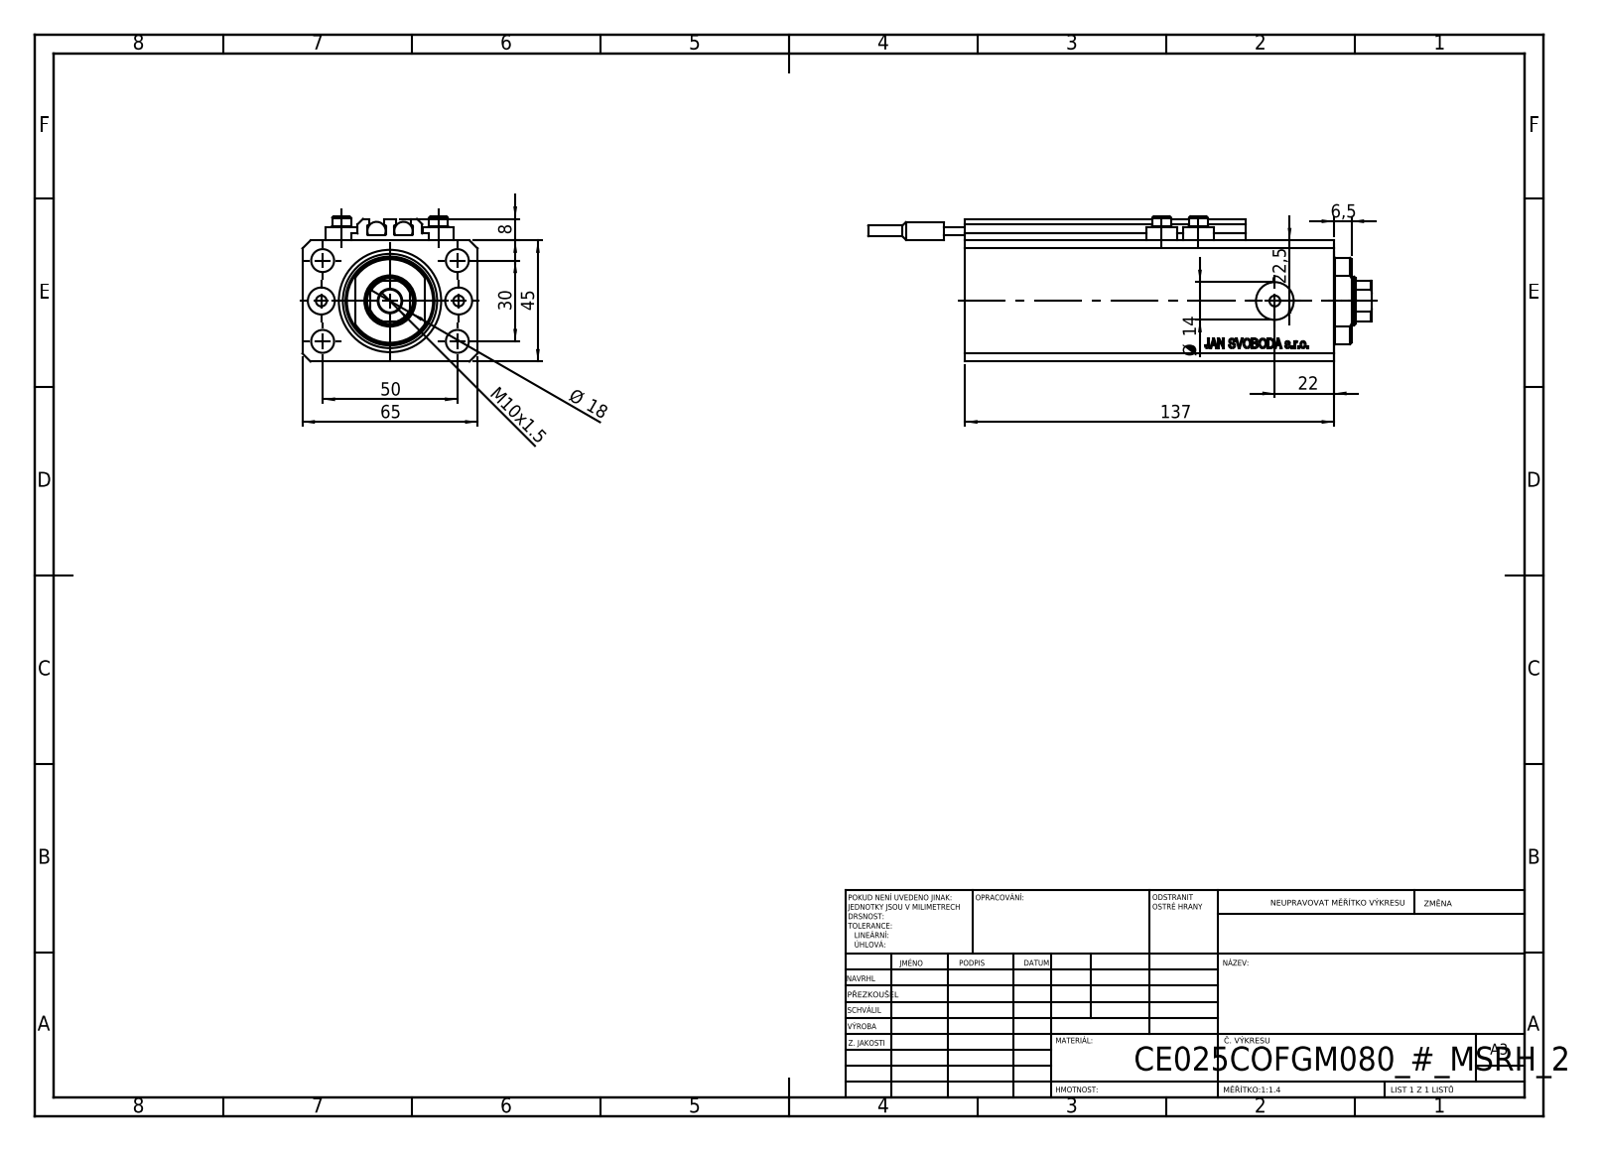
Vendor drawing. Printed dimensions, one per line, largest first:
137
65
50
45
30
22,5
22
Ø 18
Ø 14
M10x1.5
8
6,5
